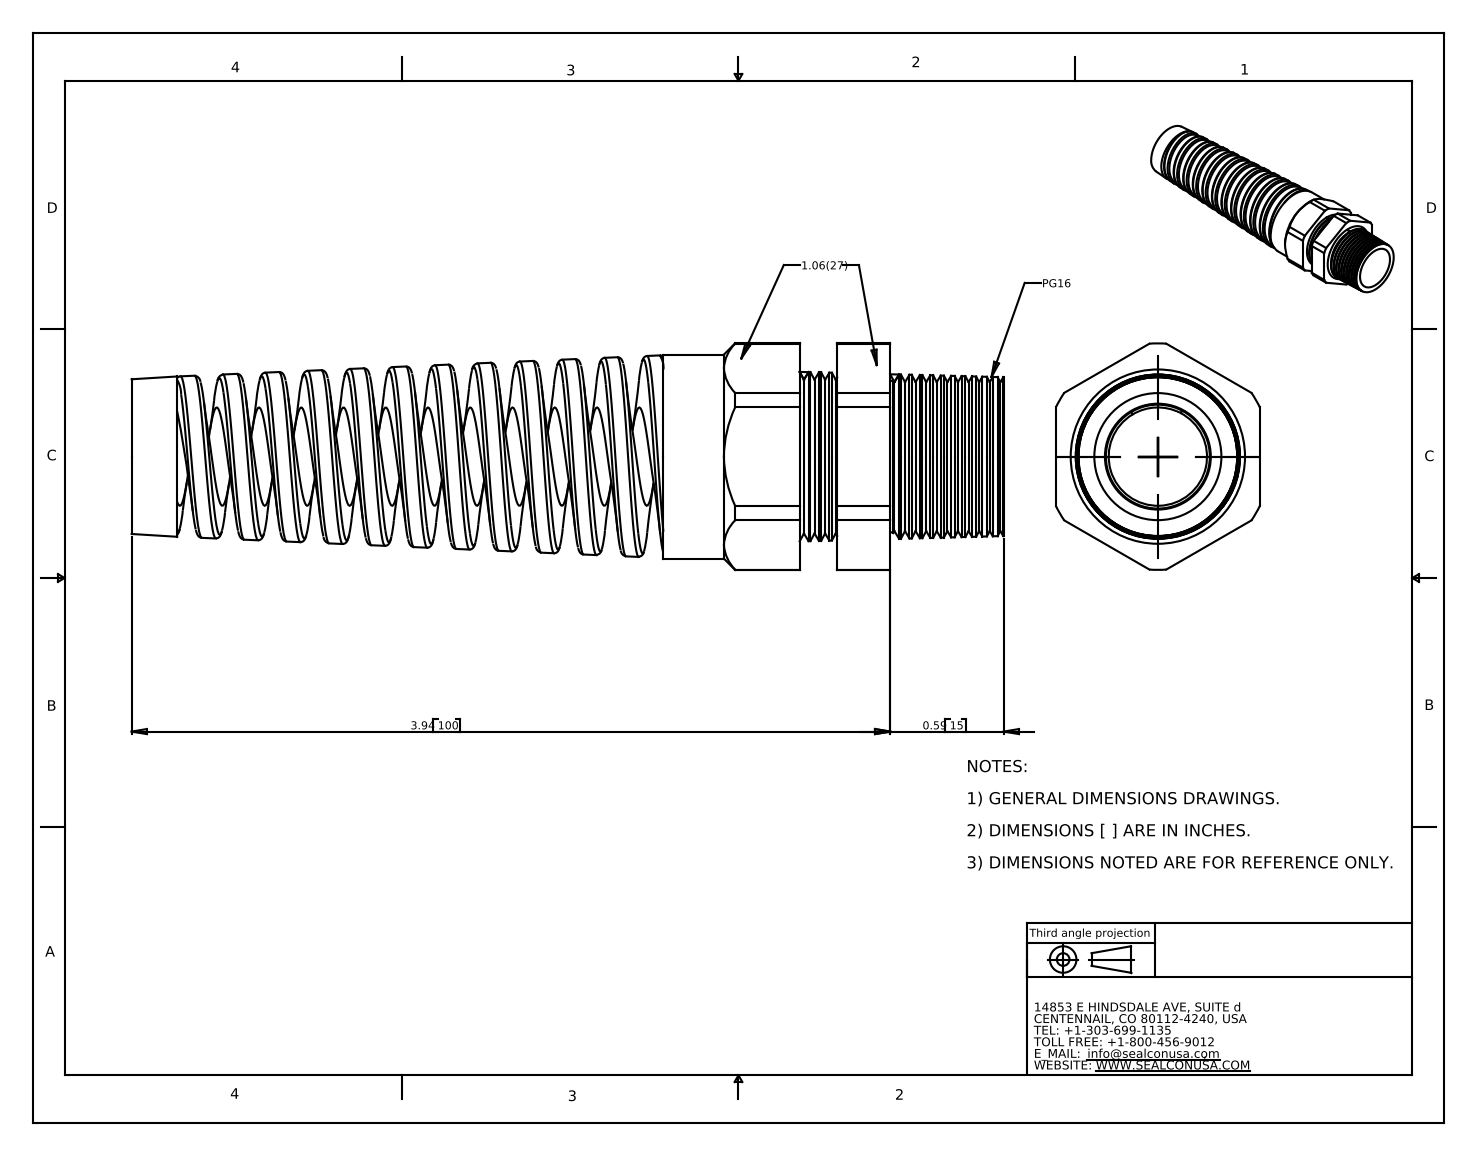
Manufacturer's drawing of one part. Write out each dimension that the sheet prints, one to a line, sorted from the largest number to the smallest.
3.94 100
0.59 15
